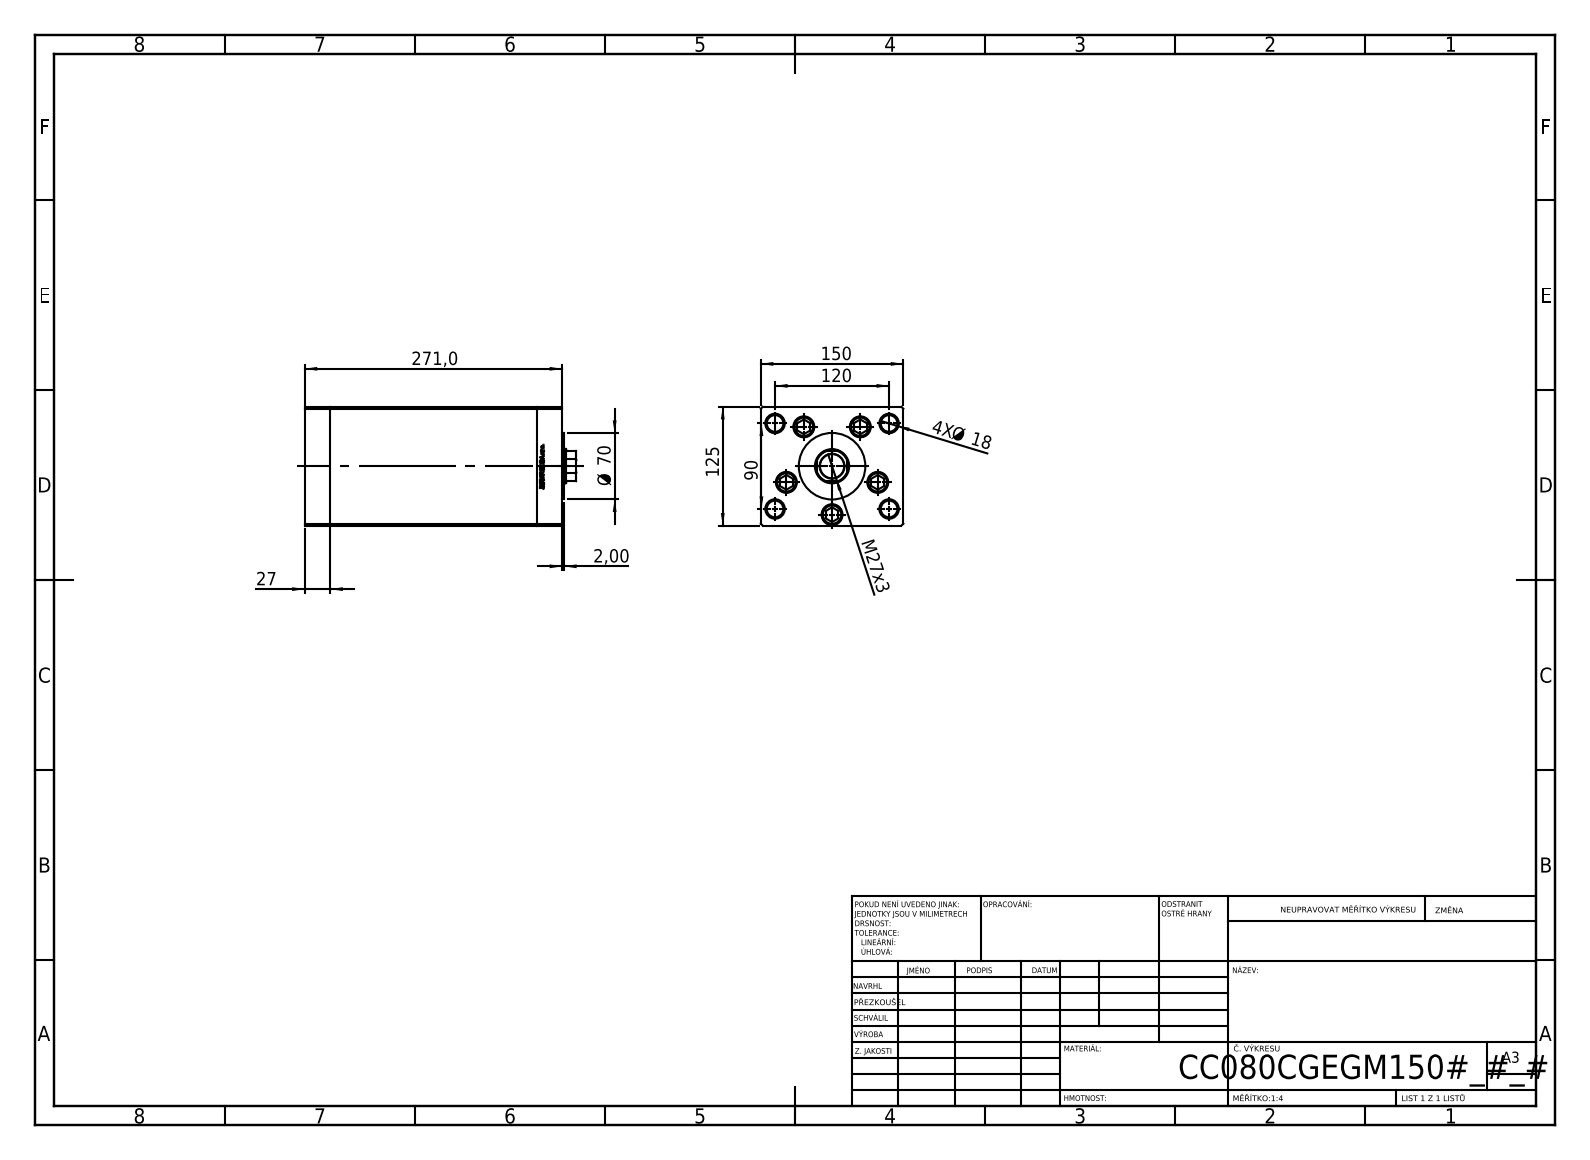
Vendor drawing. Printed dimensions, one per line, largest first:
271,0
150
125
120
90
Ø 70
27
M27x3
4X Ø 18
2,00
